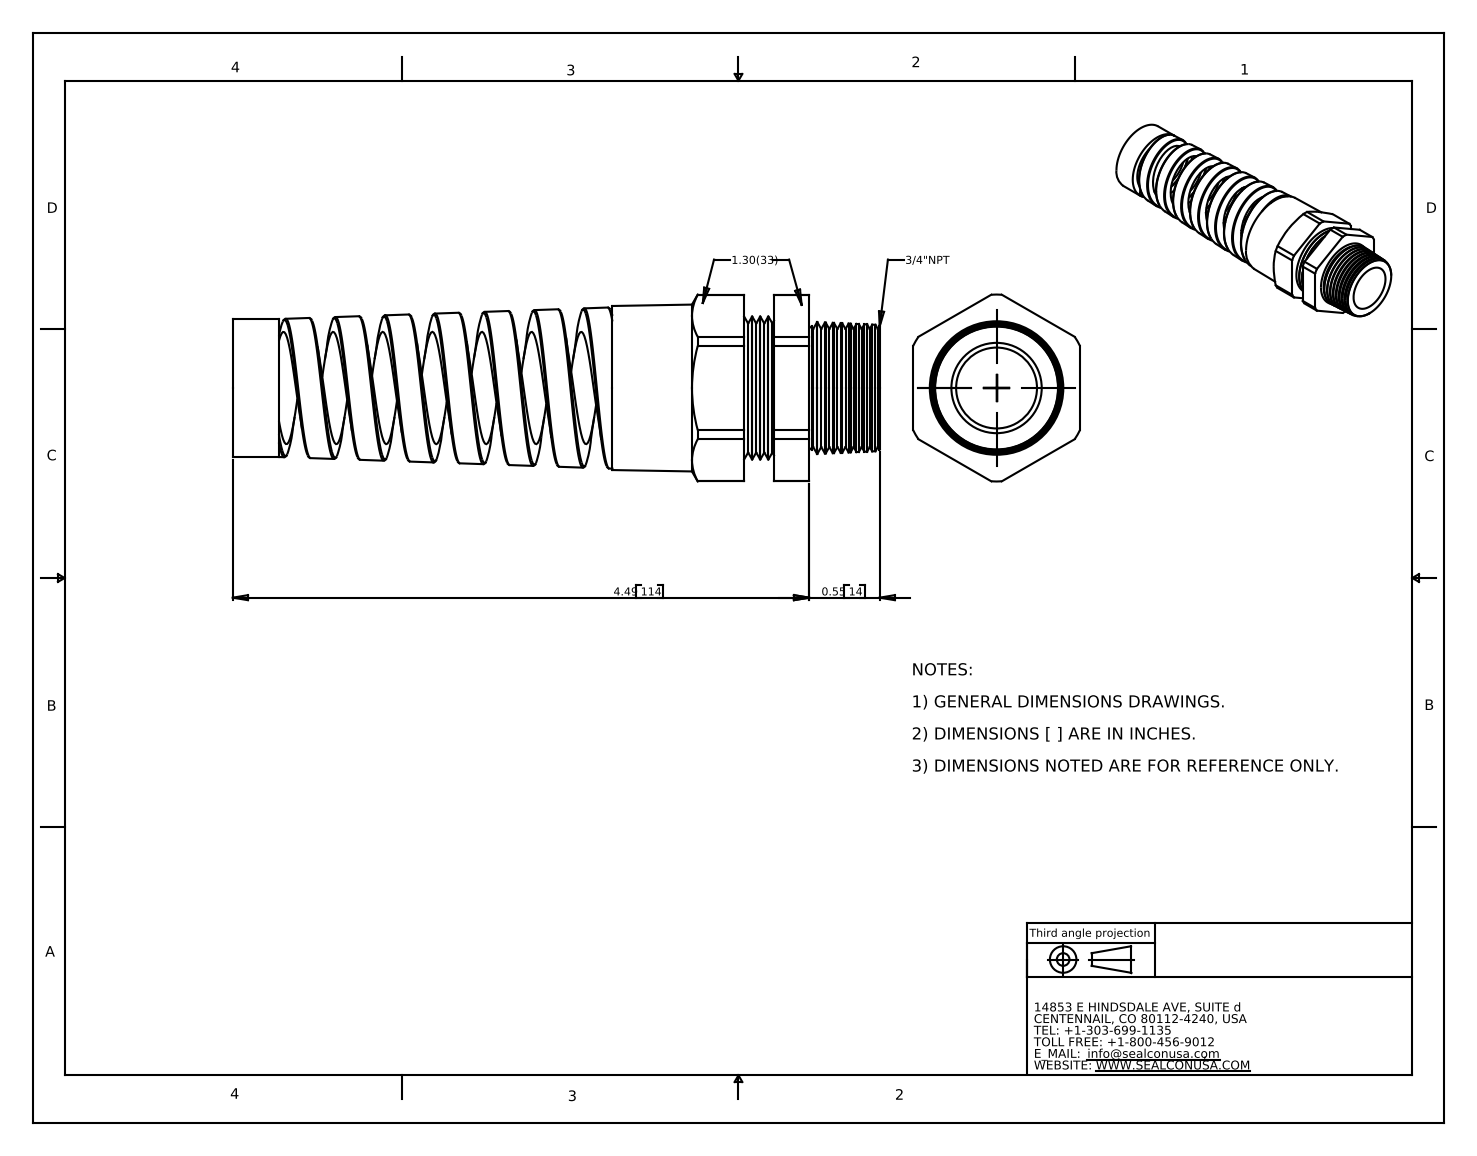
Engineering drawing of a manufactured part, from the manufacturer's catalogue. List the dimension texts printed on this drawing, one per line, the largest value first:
4.49 114
0.55 14
